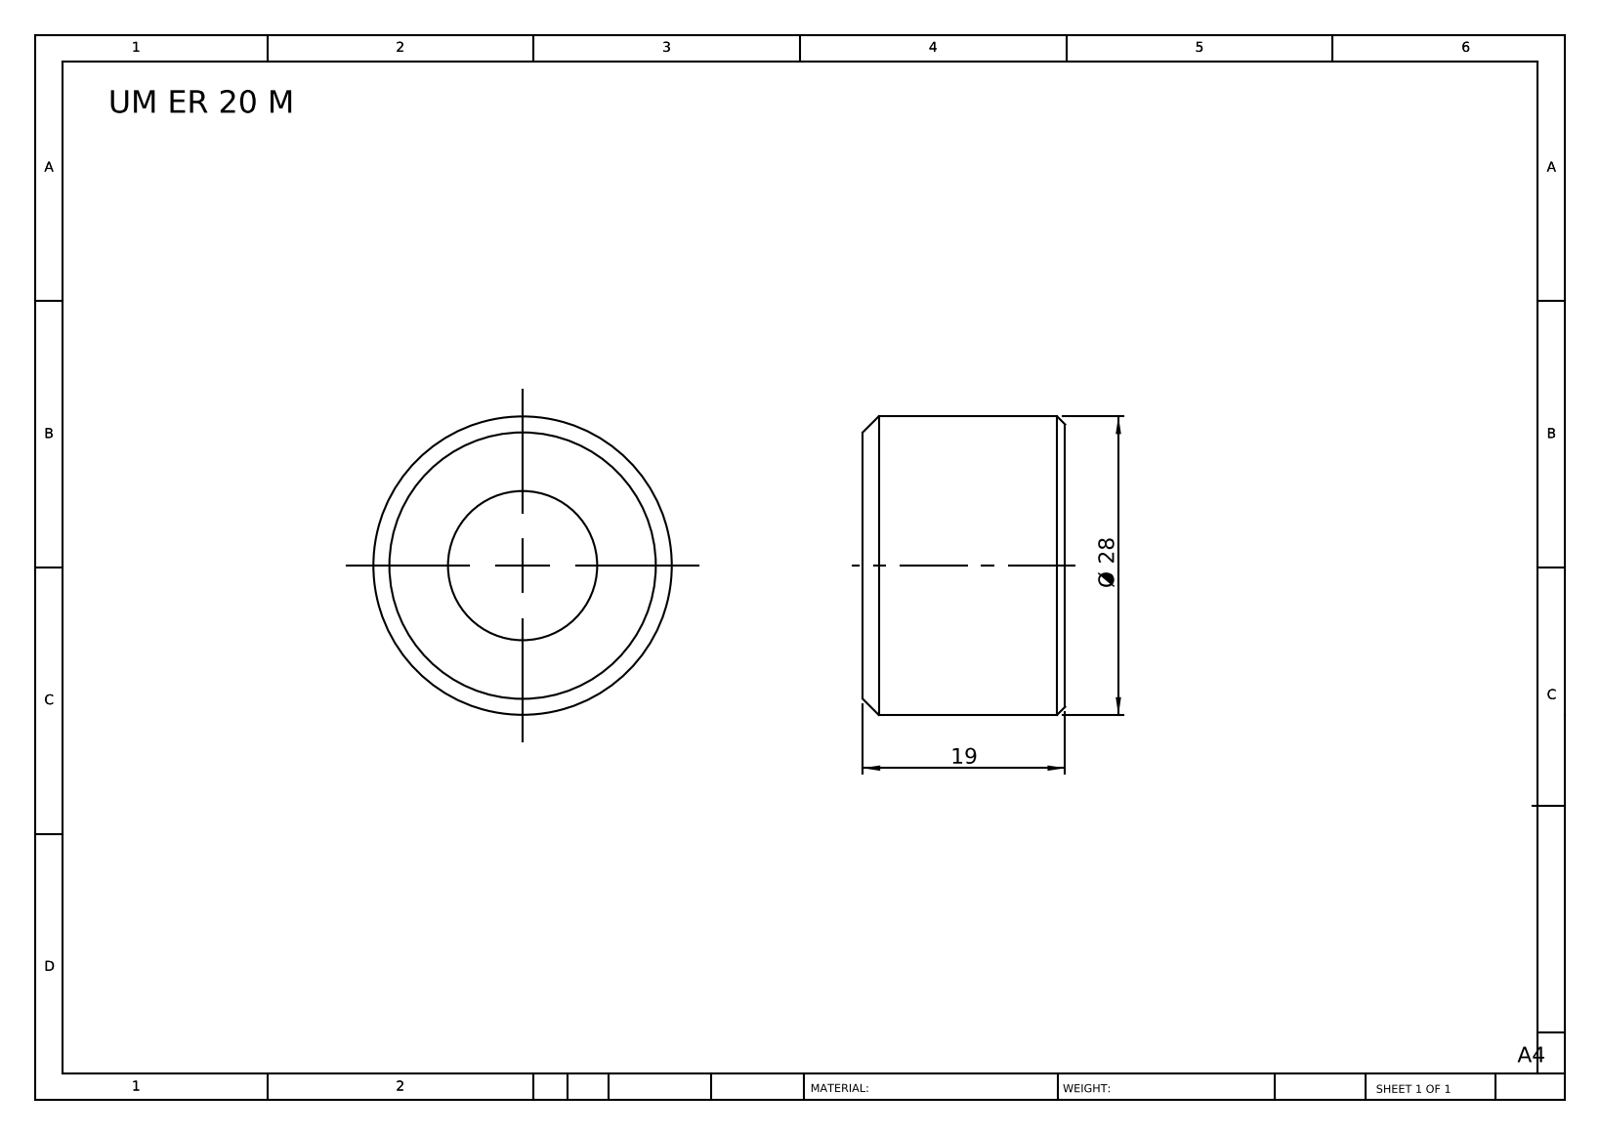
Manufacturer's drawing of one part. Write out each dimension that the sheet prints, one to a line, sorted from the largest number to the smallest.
Ø 28
19
